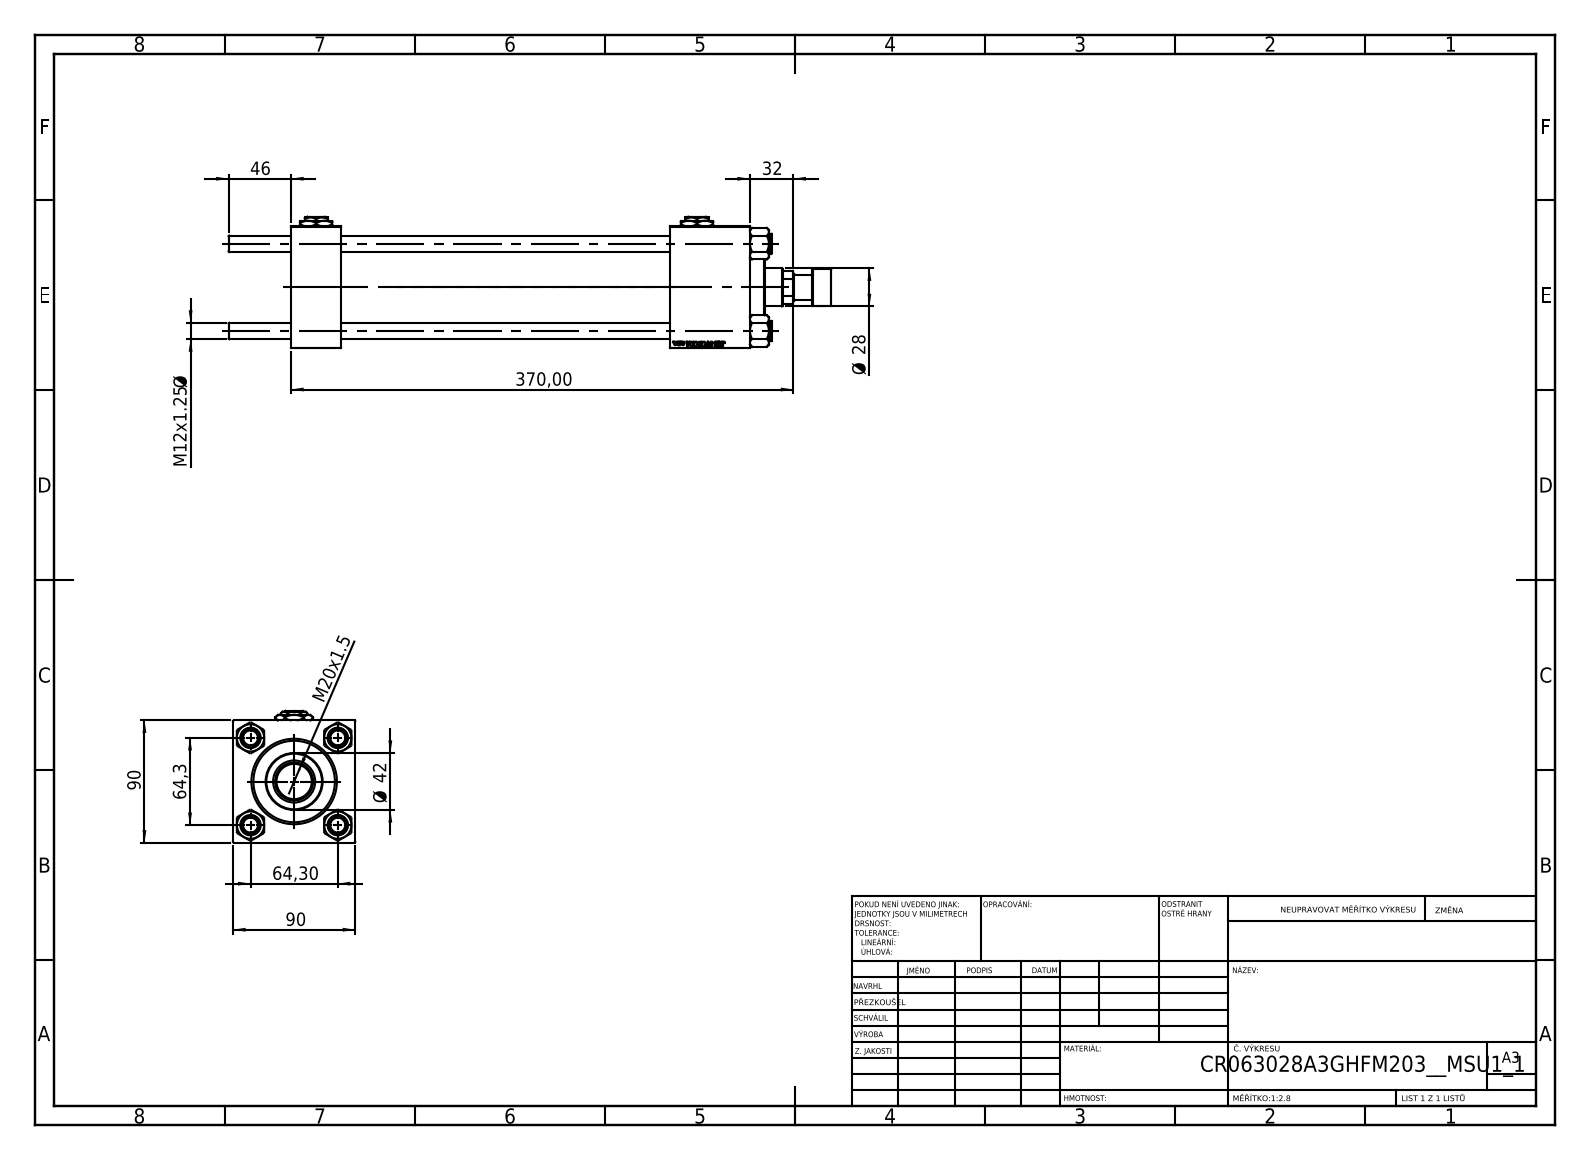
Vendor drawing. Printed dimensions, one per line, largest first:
370,00
90
90
64,3
64,30
46
Ø 42
32
Ø 28
M20x1.5
M12x1.25 Ø
